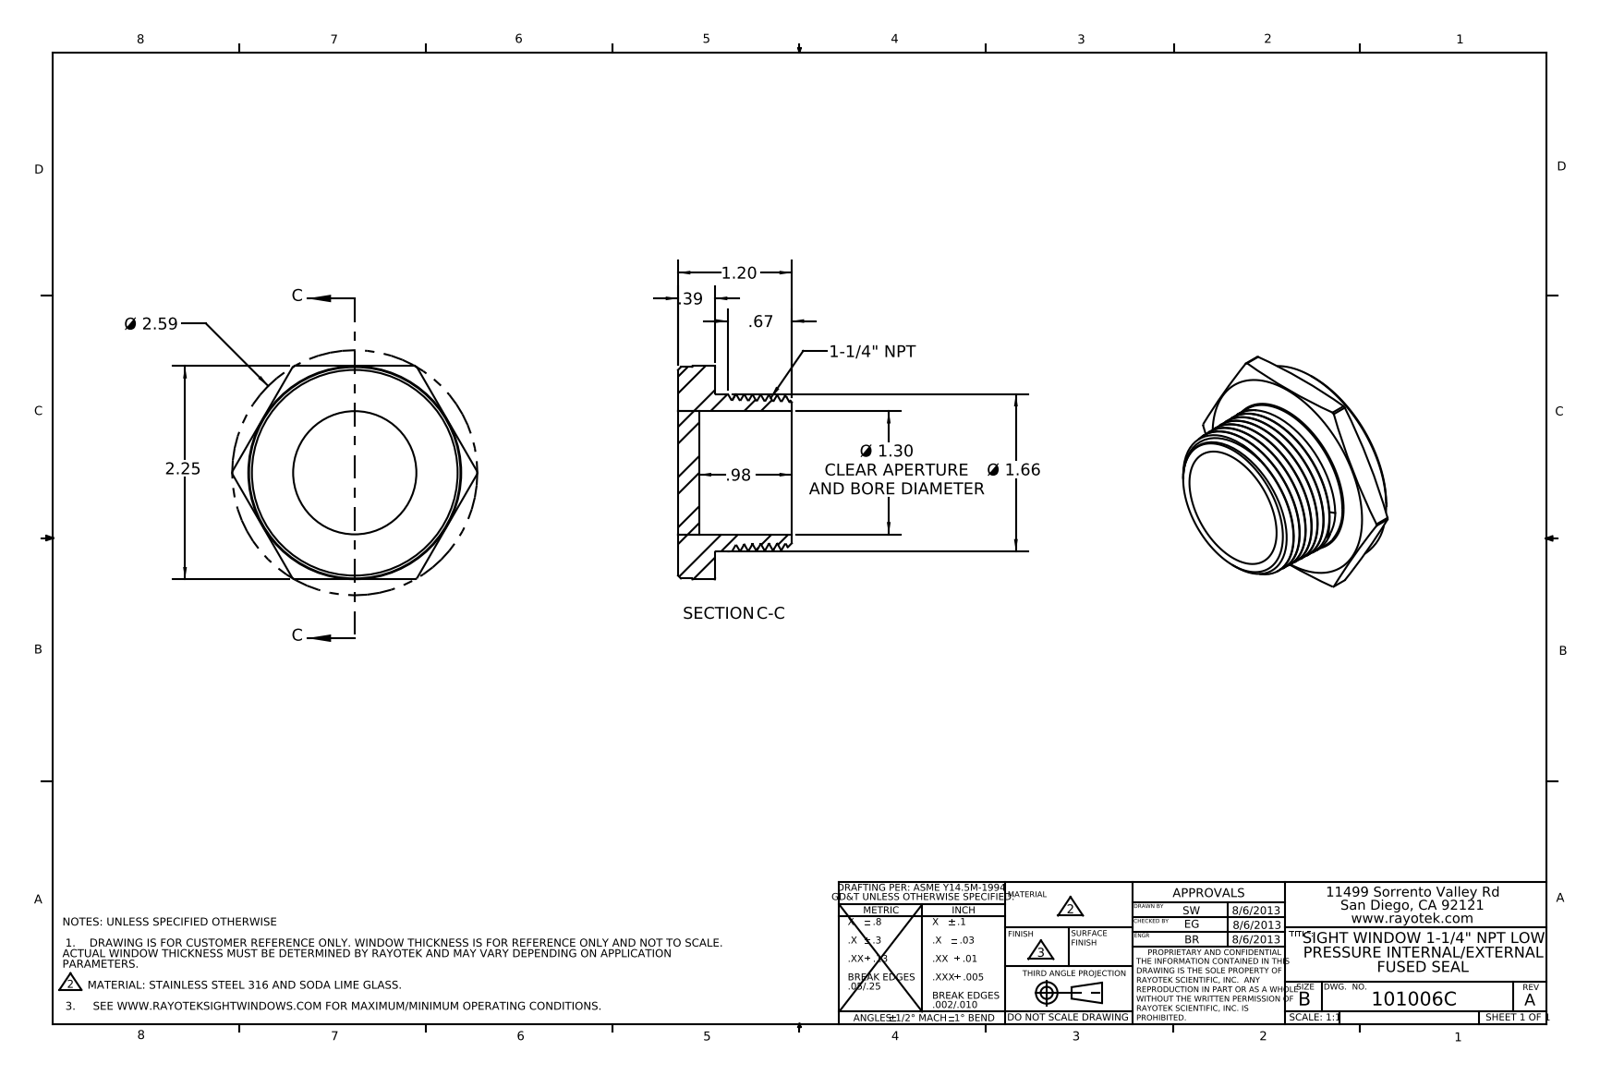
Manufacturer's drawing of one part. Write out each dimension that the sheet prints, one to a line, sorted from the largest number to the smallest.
Ø 2.59
2.25
Ø 1.66
Ø 1.30 CLEAR APERTURE AND BORE DIAMETER
1.20
.98
.67
.39
